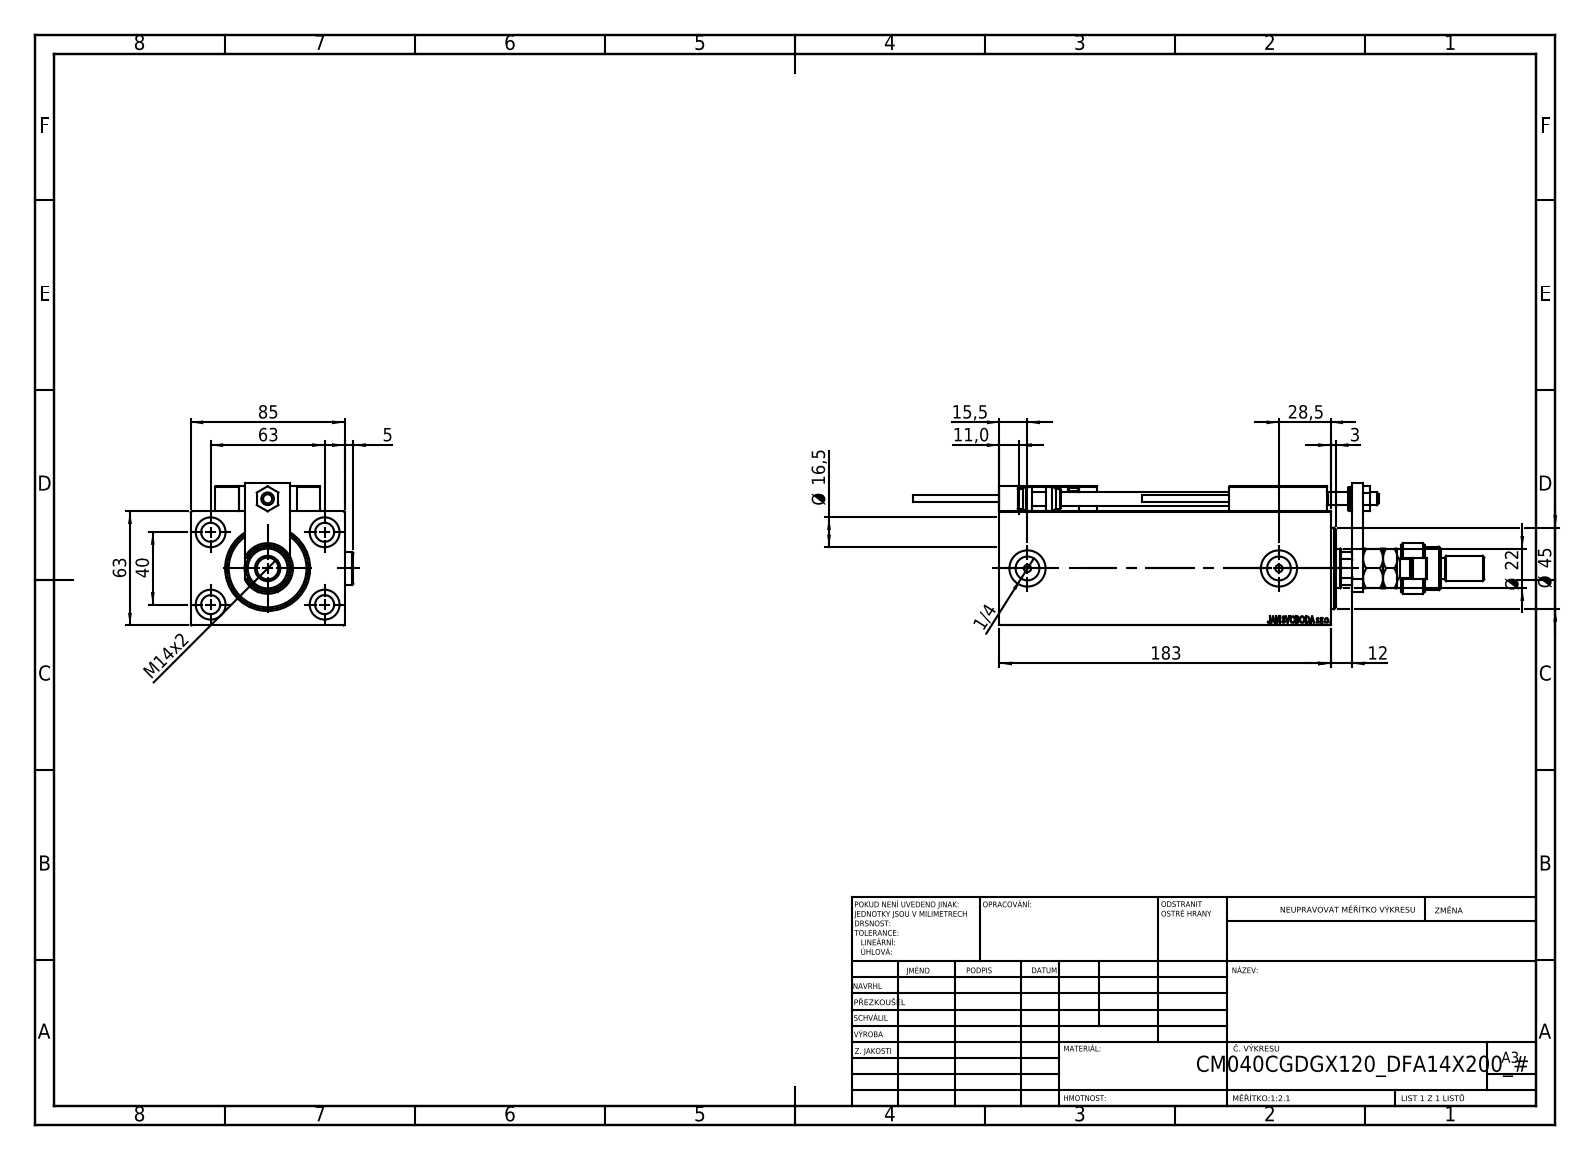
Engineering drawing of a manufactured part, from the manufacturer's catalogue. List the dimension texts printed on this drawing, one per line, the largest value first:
183
85
63
63
Ø 45
40
28,5
Ø 22
Ø 16,5
15,5
M14x2
12
11,0
5
3
1/4
